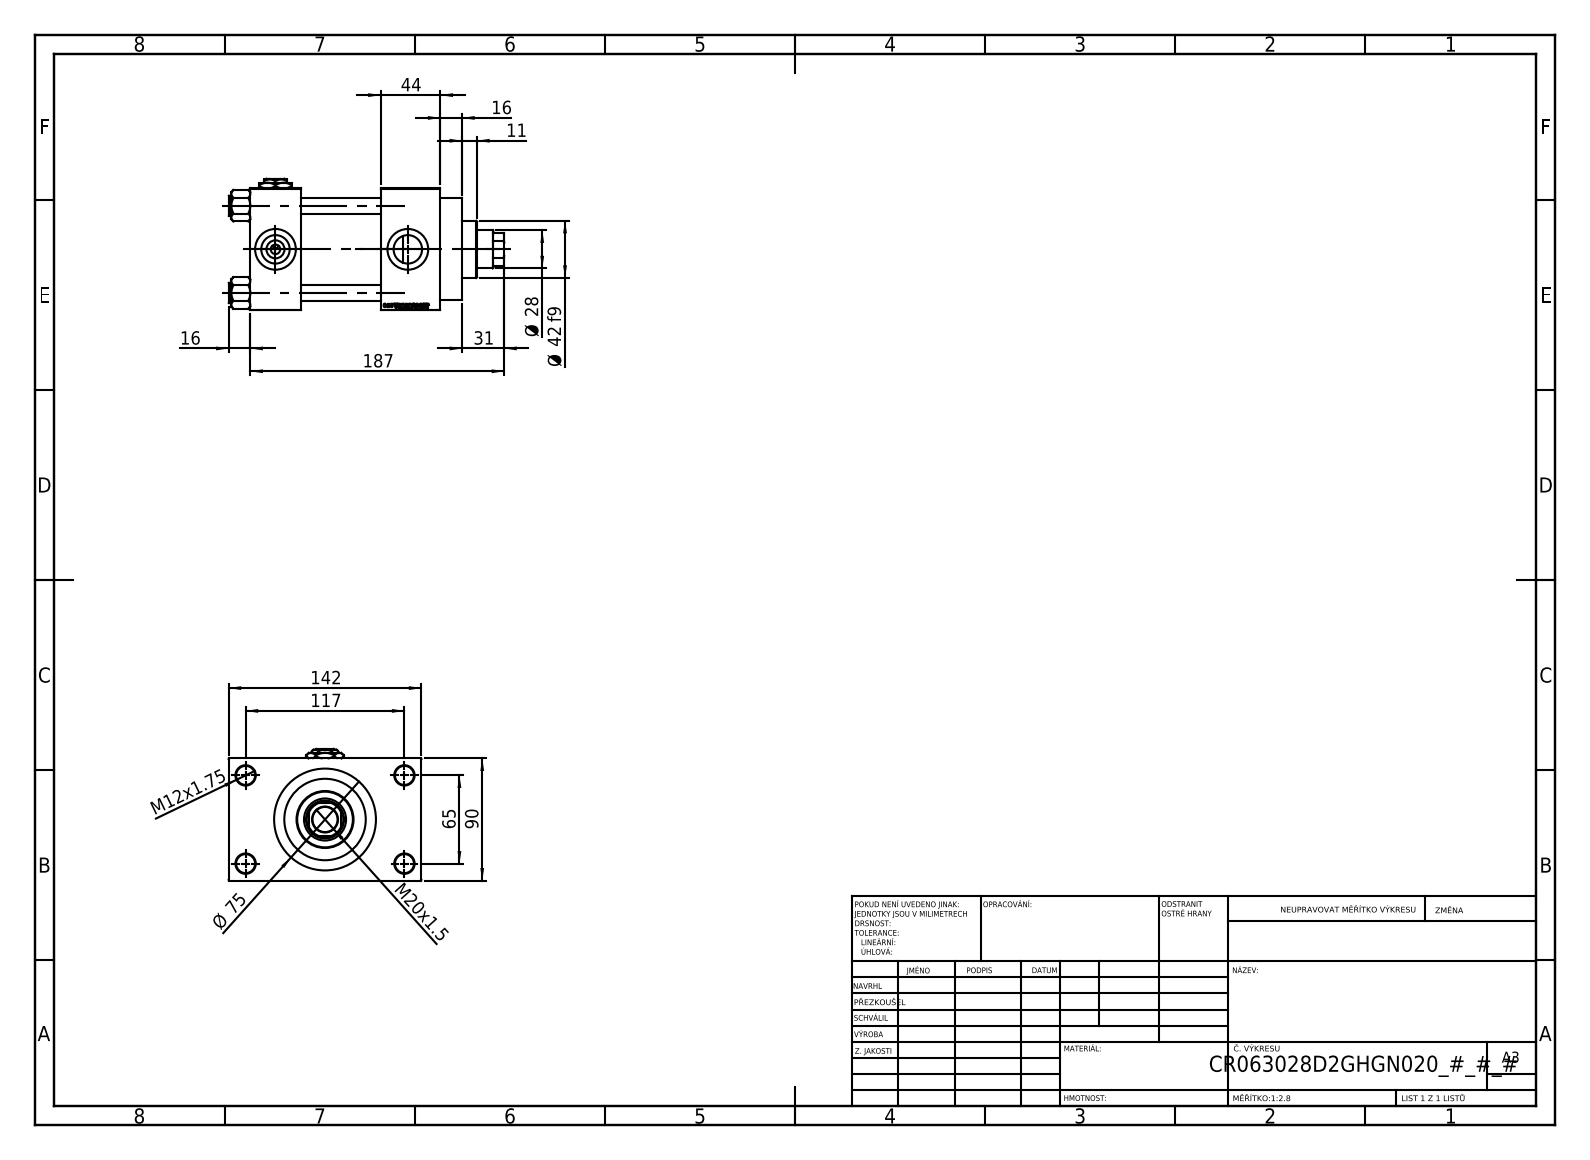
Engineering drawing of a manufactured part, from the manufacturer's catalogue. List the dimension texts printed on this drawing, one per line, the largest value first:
187
142
117
90
Ø 75
65
44
Ø 42 f9
31
Ø 28
M20x1.5
16
16
M12x1.75
11
